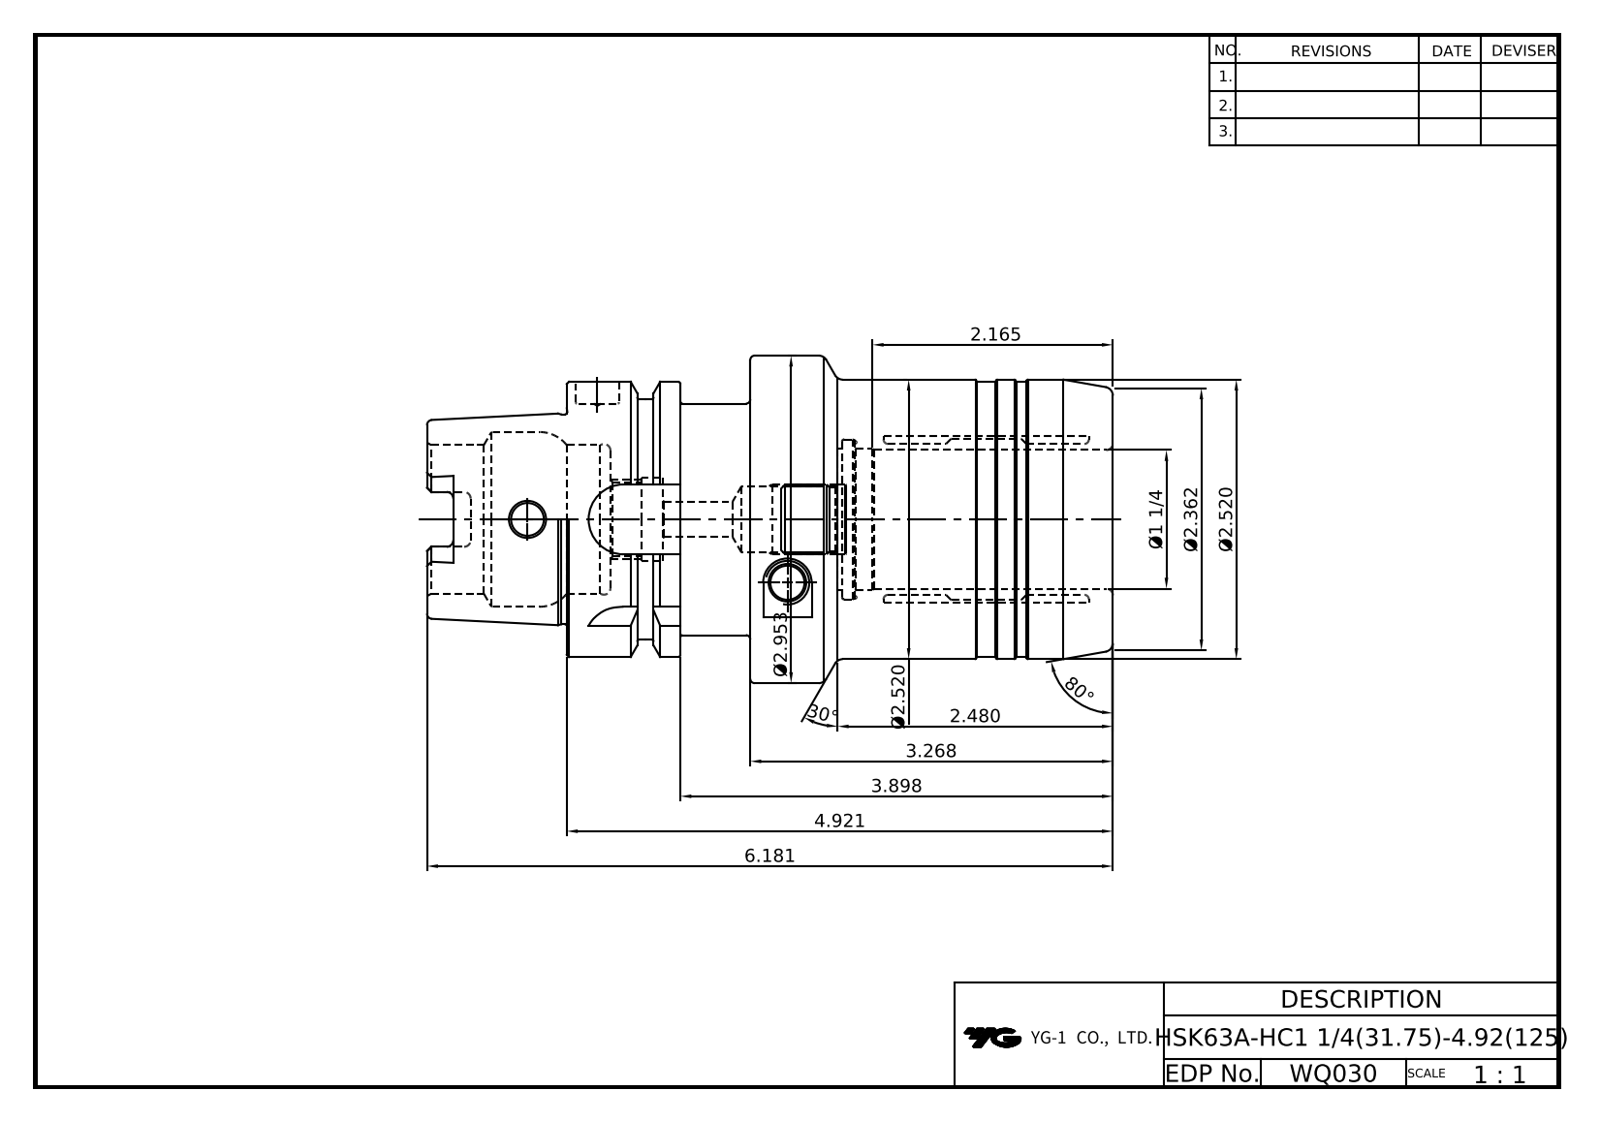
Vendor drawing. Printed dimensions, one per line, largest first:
80°
30°
6.181
4.921
3.898
3.268
Ø2.953
Ø2.520
Ø2.520
2.480
Ø2.362
2.165
Ø1 1/4
